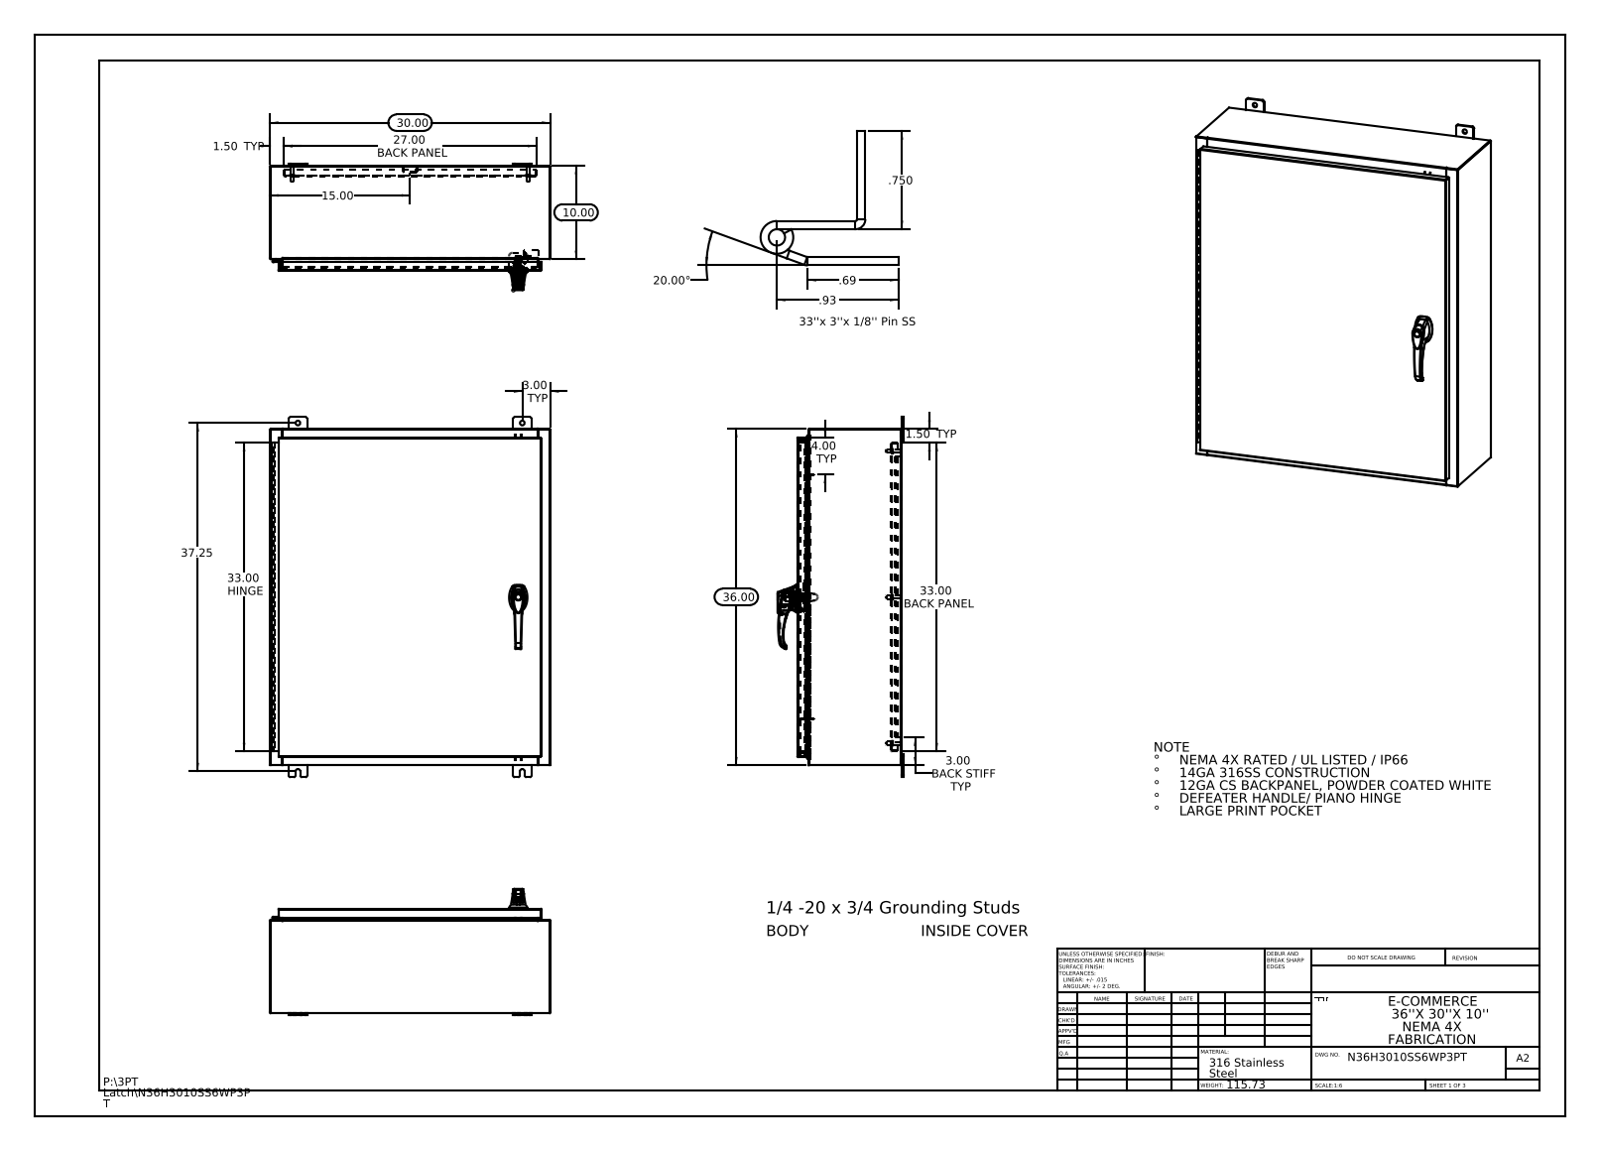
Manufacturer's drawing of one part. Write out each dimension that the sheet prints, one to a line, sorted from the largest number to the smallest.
37.25
36.00
33.00 HINGE
33.00 BACK PANEL
30.00
27.00 BACK PANEL
20.00°
15.00
10.00
4.00 TYP
3.00 TYP
3.00 BACK STIFF TYP
1.50 TYP
1.50 TYP
.93
.750
.69
